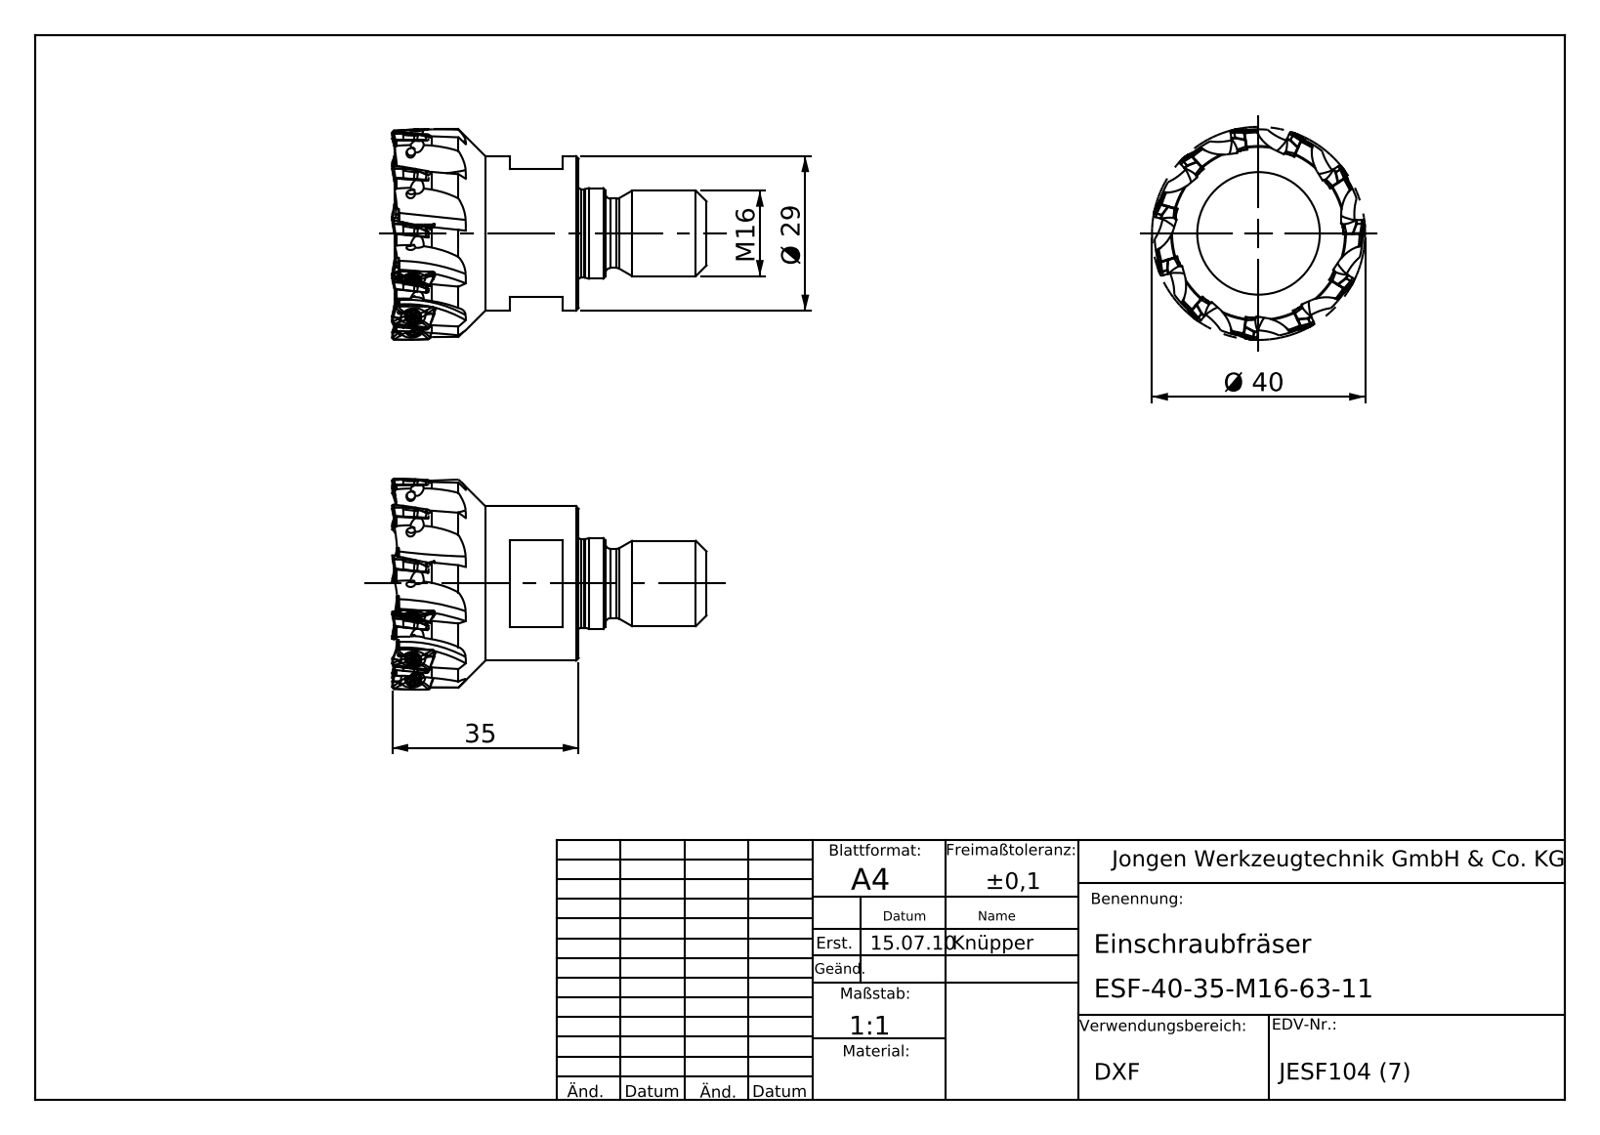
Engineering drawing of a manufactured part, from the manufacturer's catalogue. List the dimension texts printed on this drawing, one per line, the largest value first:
Ø 40
35
Ø 29
M 16
